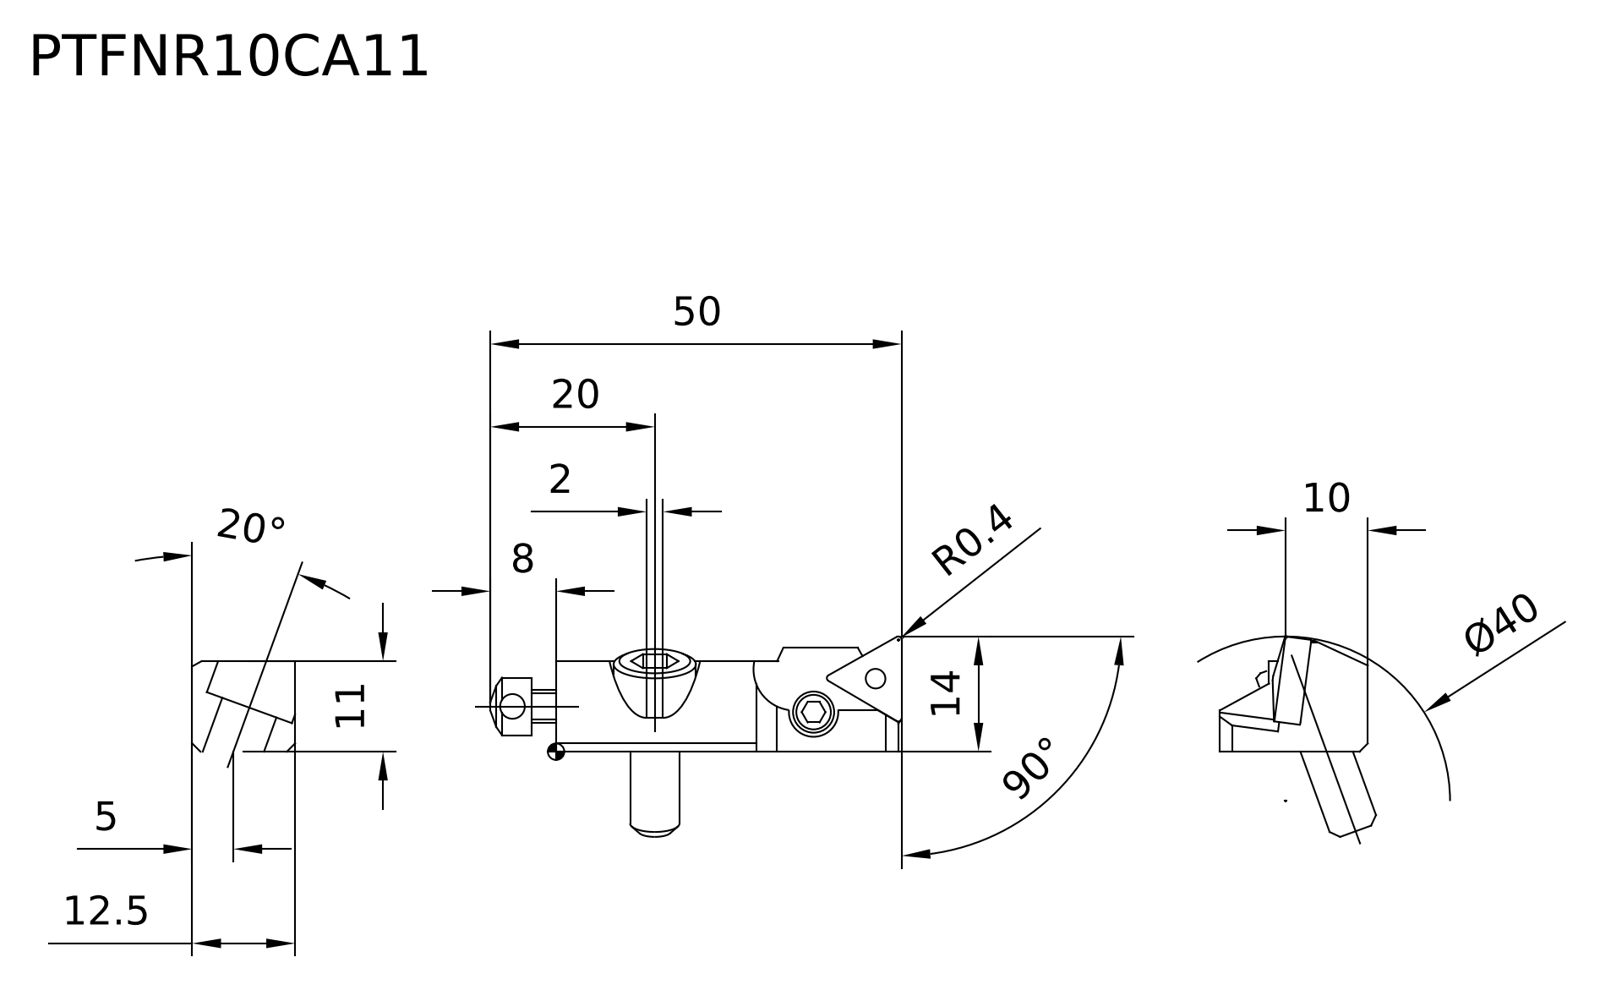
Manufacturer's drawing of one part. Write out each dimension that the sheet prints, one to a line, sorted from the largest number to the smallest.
90°
50
Ø40
20°
20
14
12.5
11
10
8
5
2
R0.4
